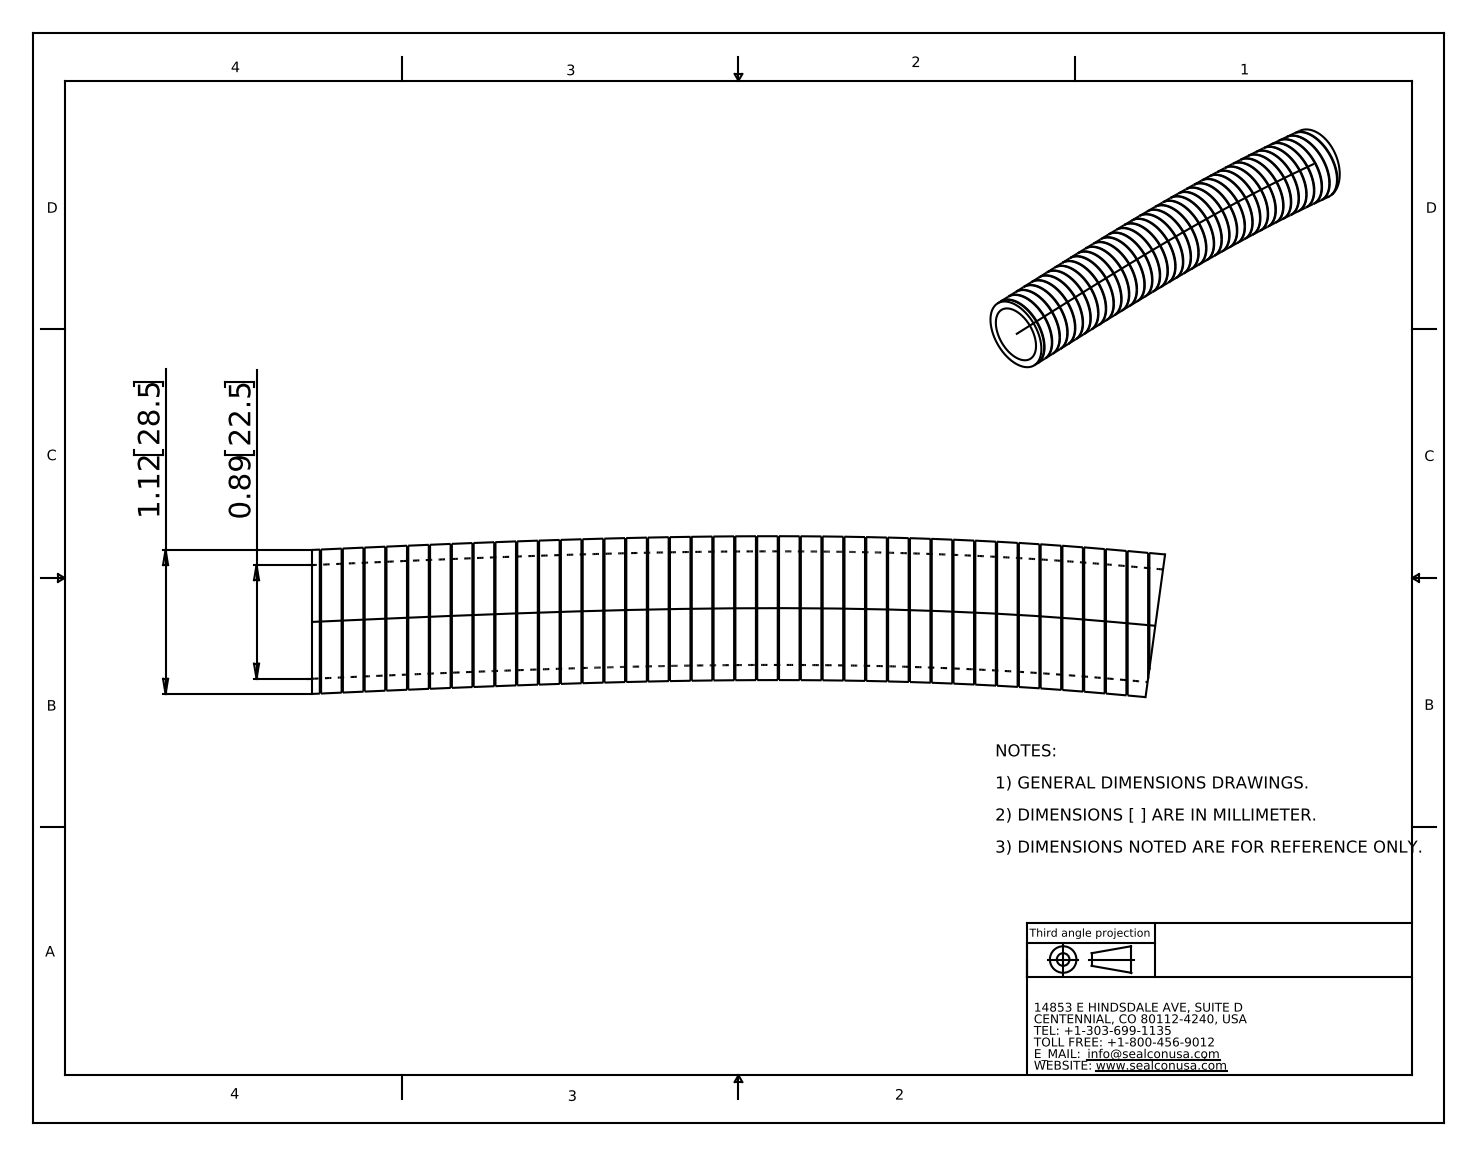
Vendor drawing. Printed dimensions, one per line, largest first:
1.12 28.5
0.89 22.5
